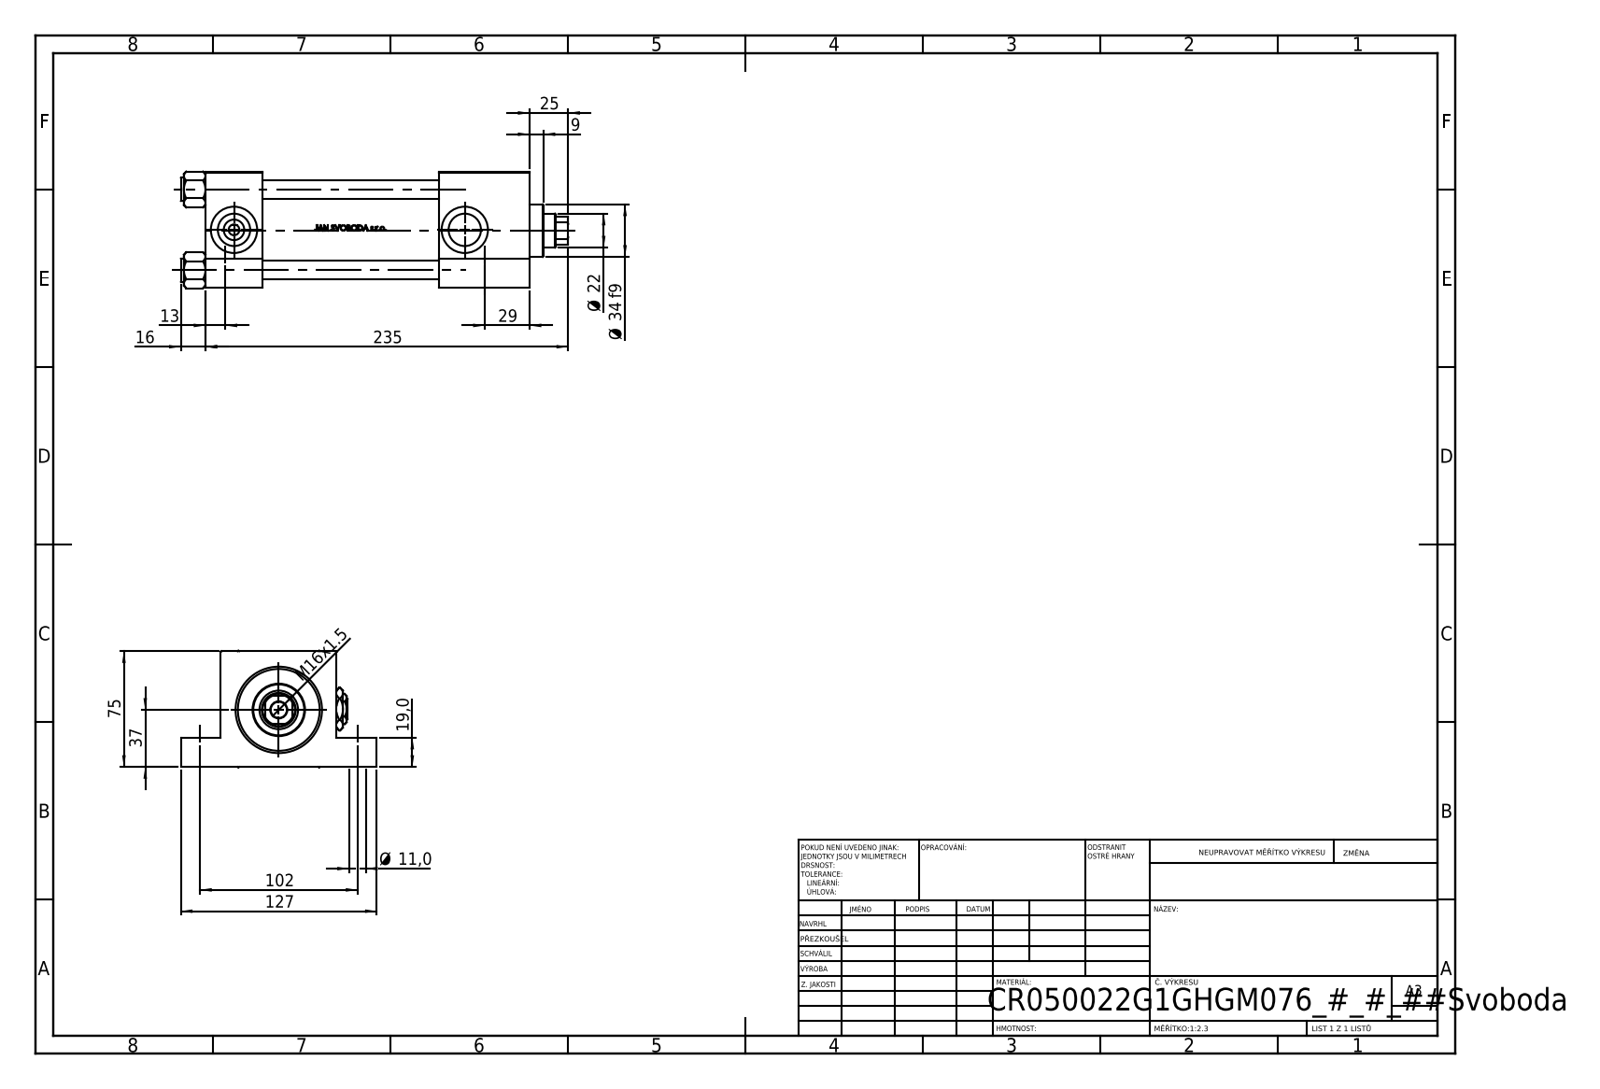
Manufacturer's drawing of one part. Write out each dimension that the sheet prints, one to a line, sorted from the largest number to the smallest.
235
127
102
75
37
Ø 34 f9
29
25
Ø 22
19,0
16
M16x1.5
13
Ø 11,0
9
